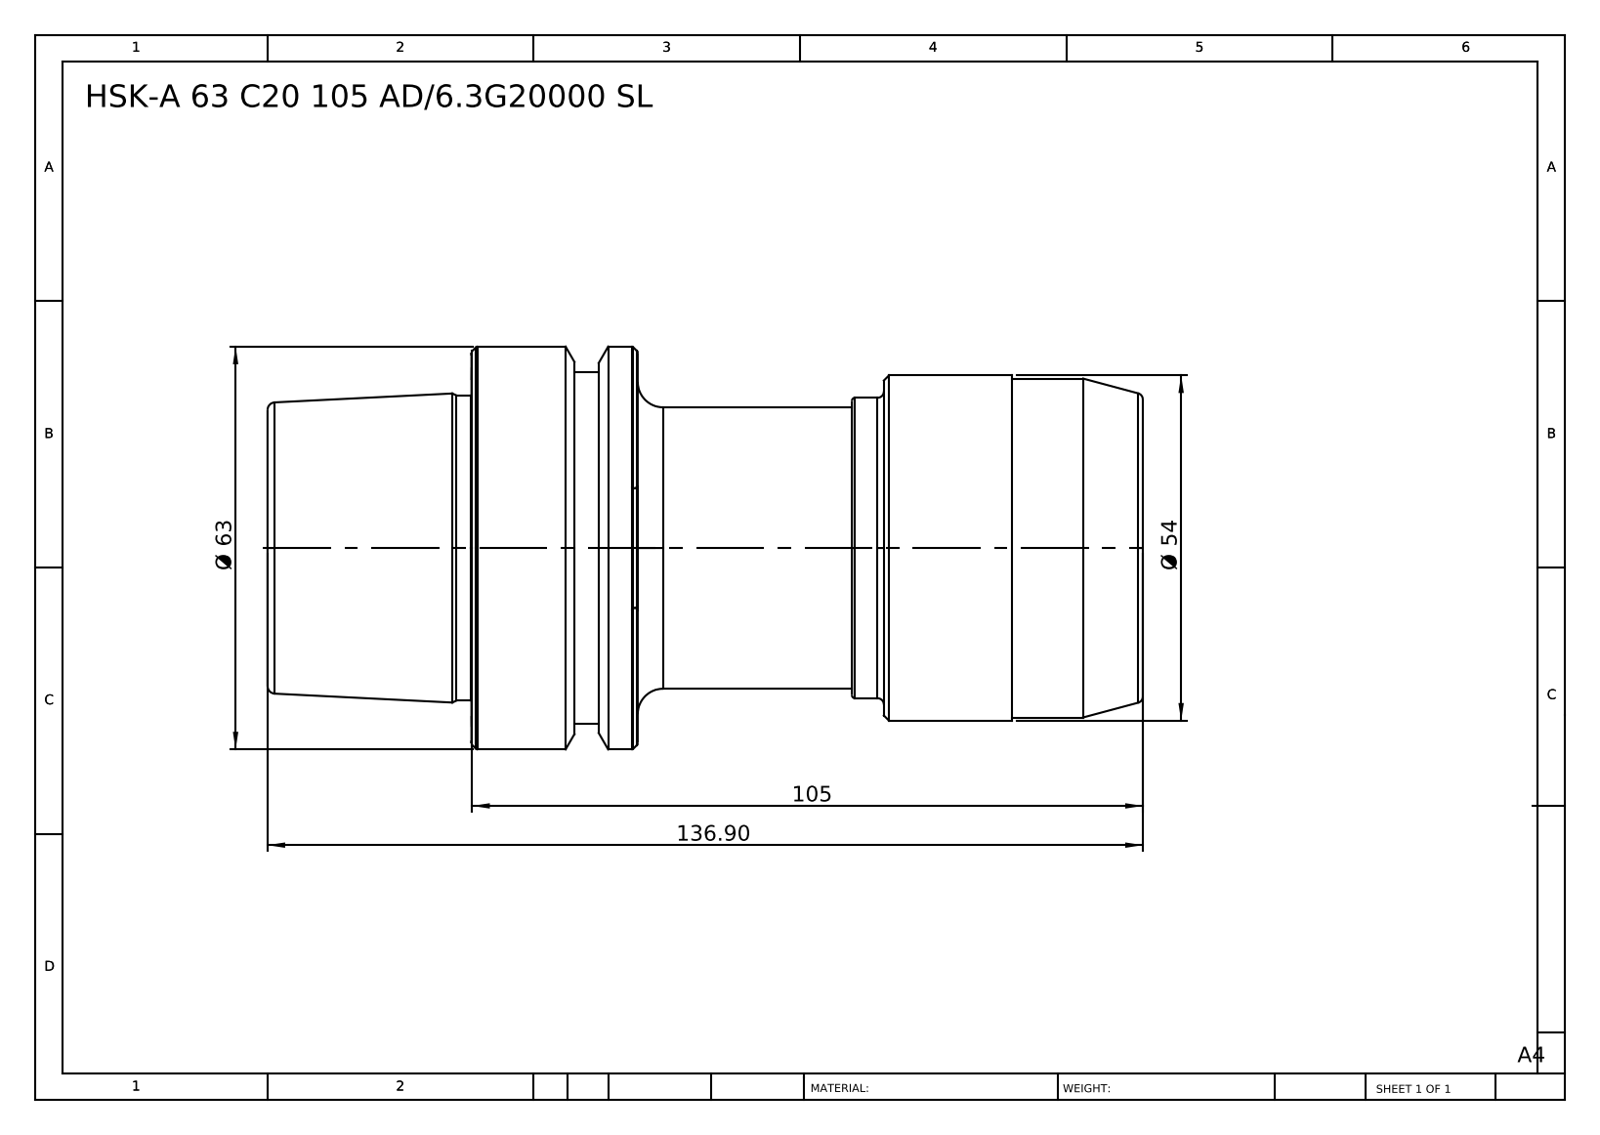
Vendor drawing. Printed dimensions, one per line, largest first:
136.90
105
Ø 63
Ø 54
